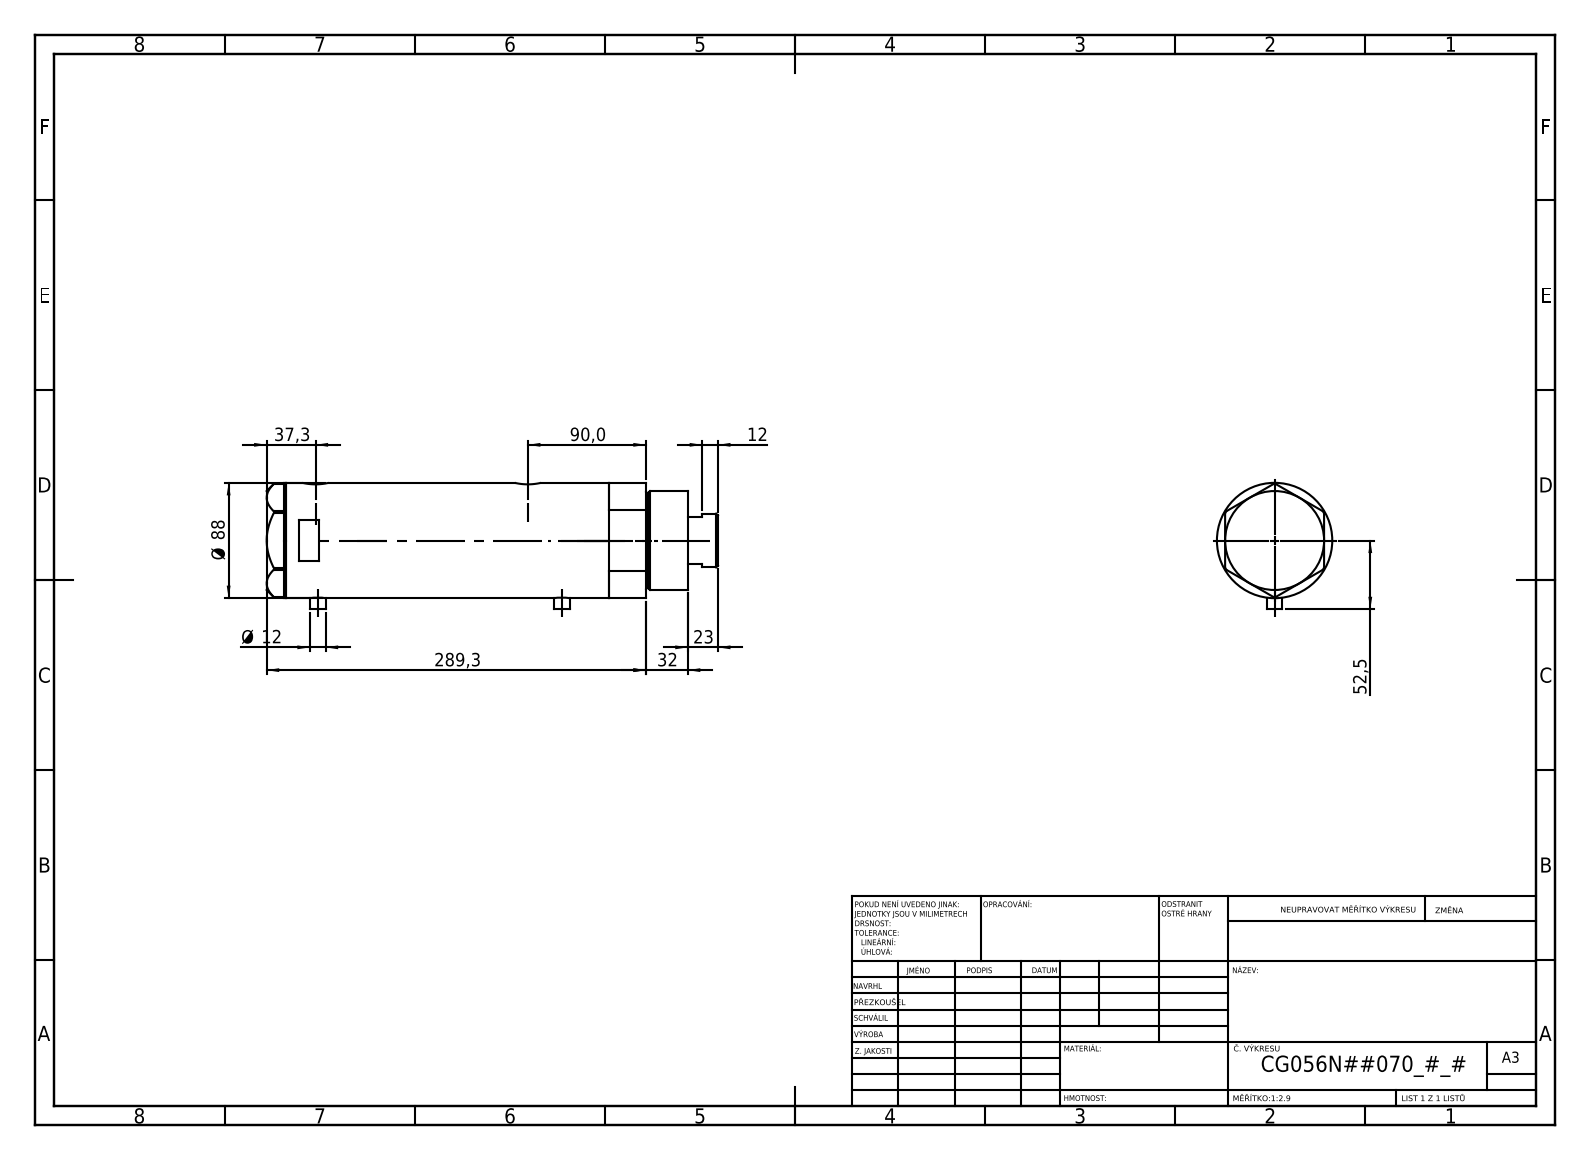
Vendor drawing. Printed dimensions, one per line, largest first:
289,3
90,0
Ø 88
52,5
37,3
32
23
12
Ø 12
